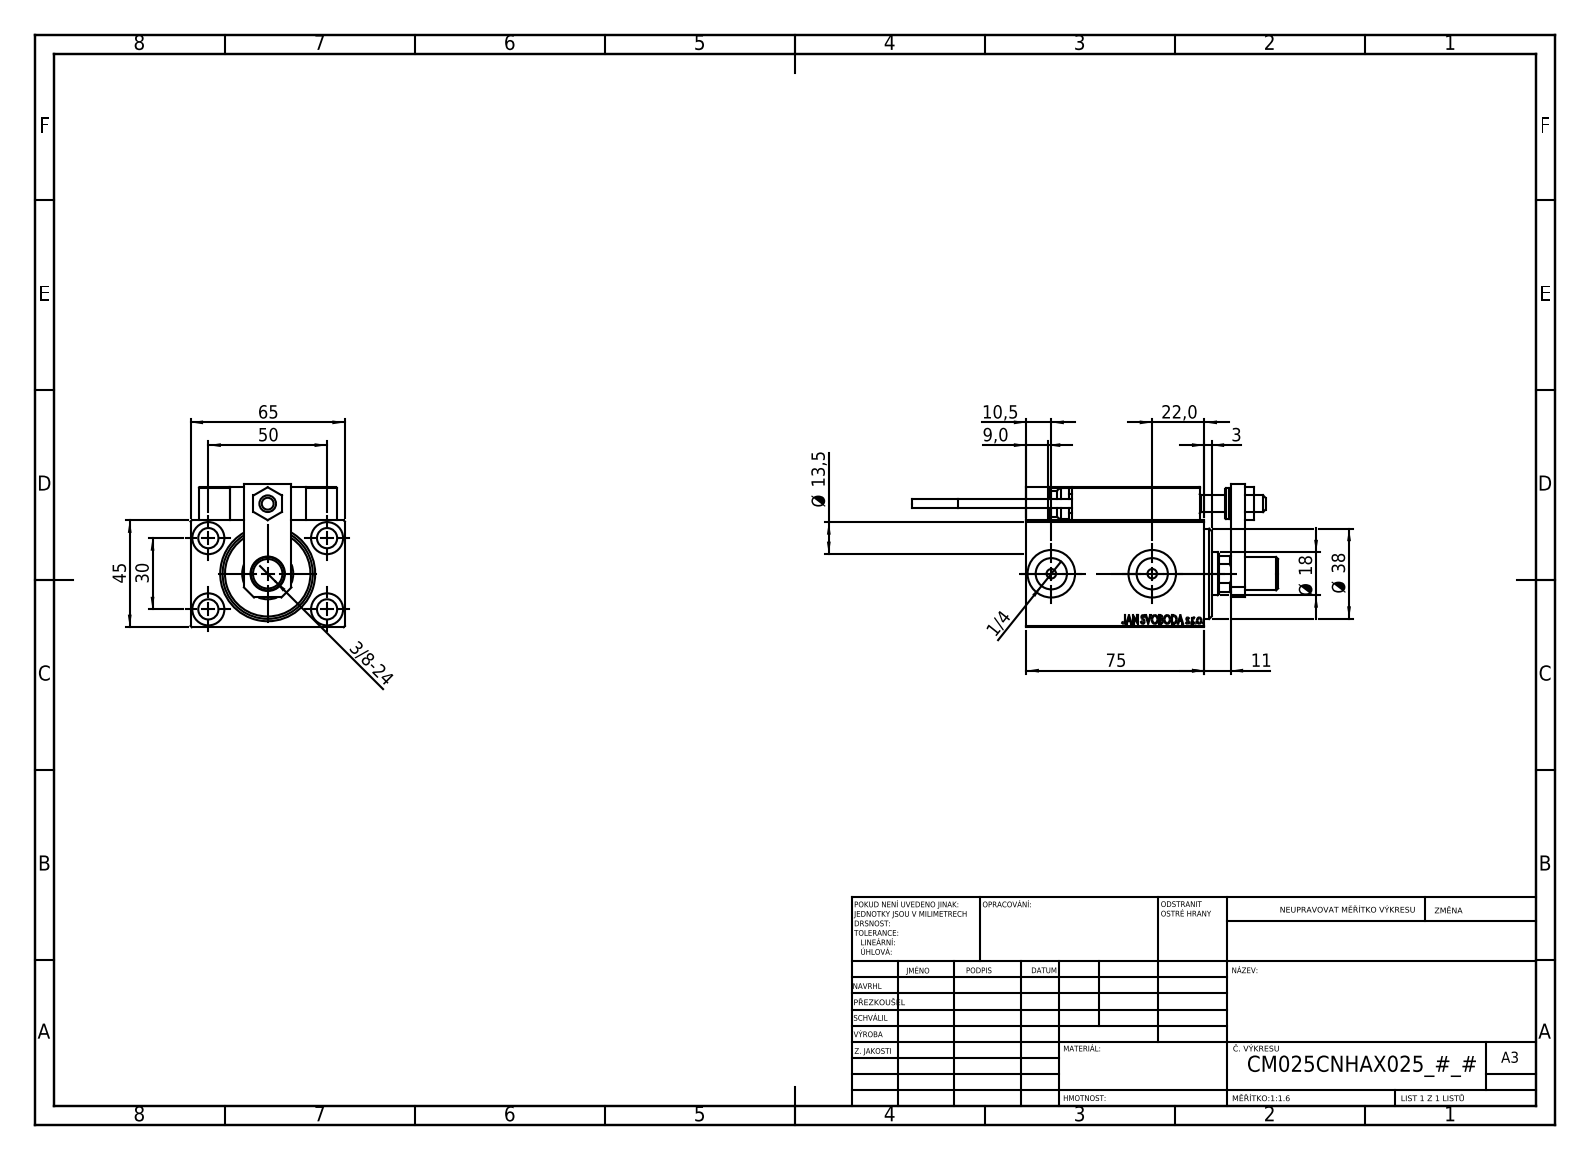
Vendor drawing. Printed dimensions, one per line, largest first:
75
65
50
45
Ø 38
30
22,0
Ø 18
Ø 13,5
11
10,5
9,0
3
3/8-24
1/4
